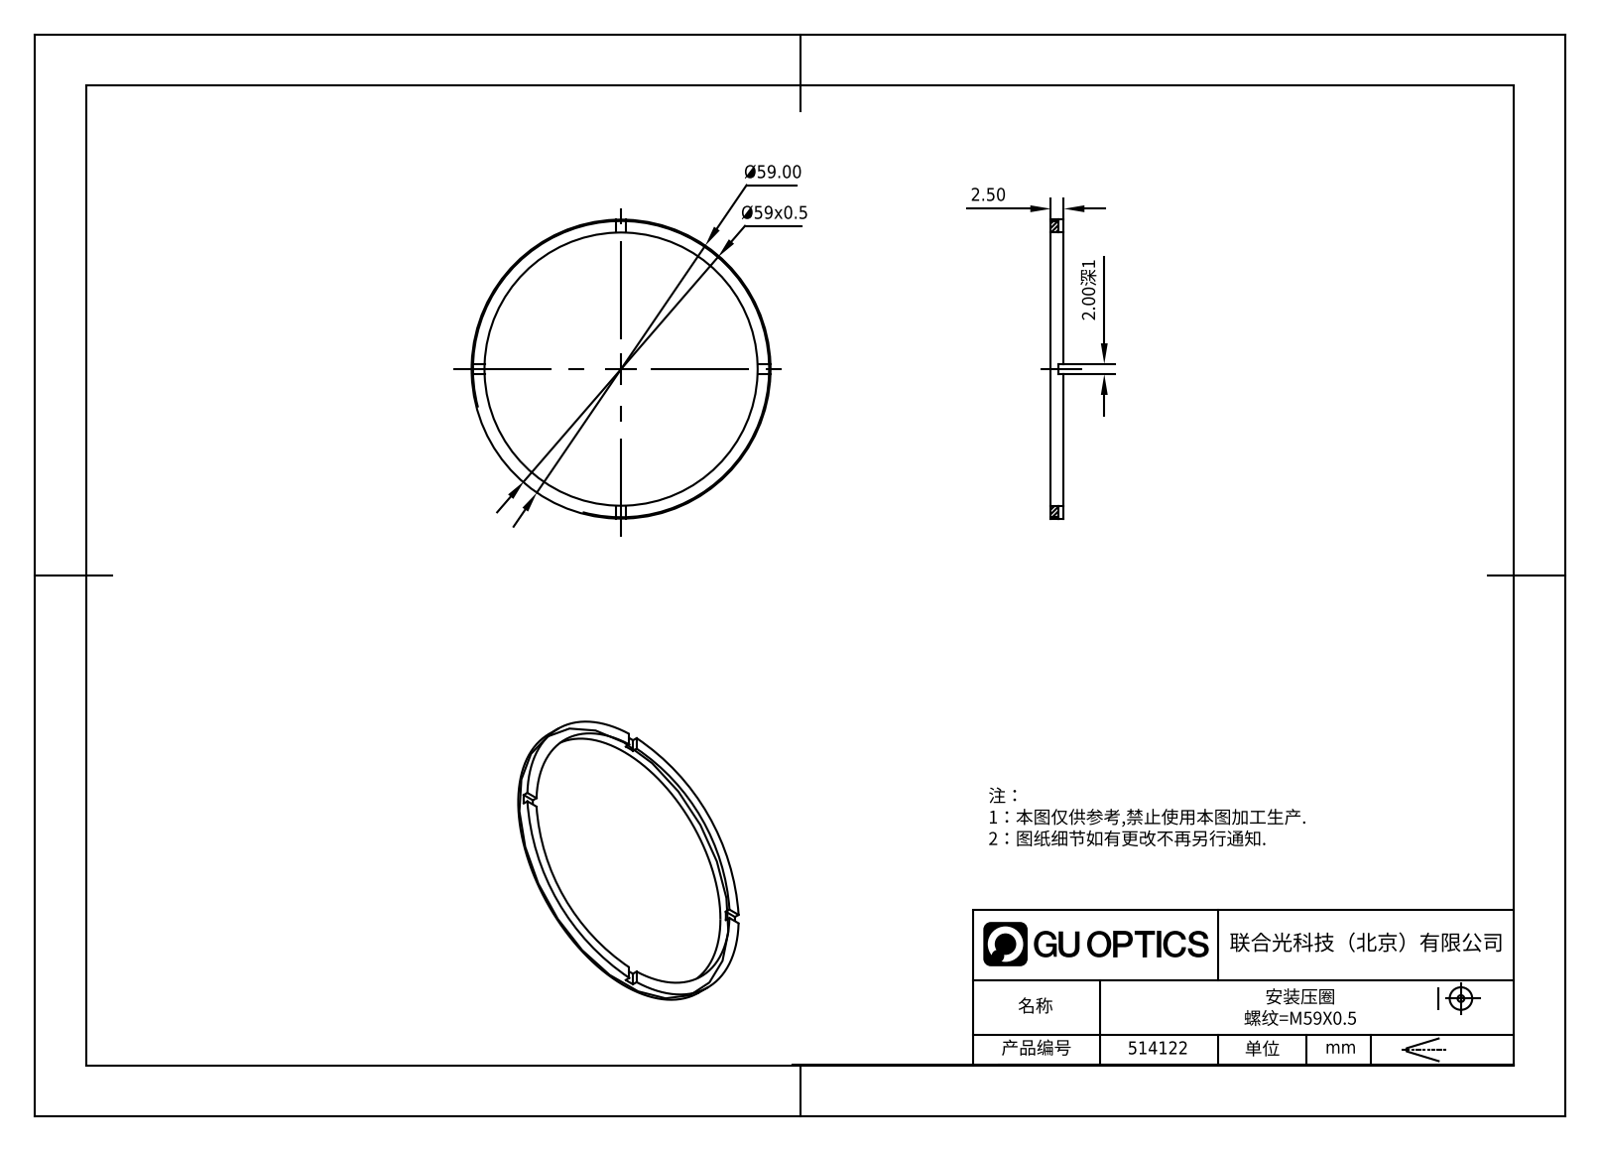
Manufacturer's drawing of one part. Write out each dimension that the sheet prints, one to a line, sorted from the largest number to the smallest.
Ø59.00
Ø59x0.5
2.50
2.00深1
